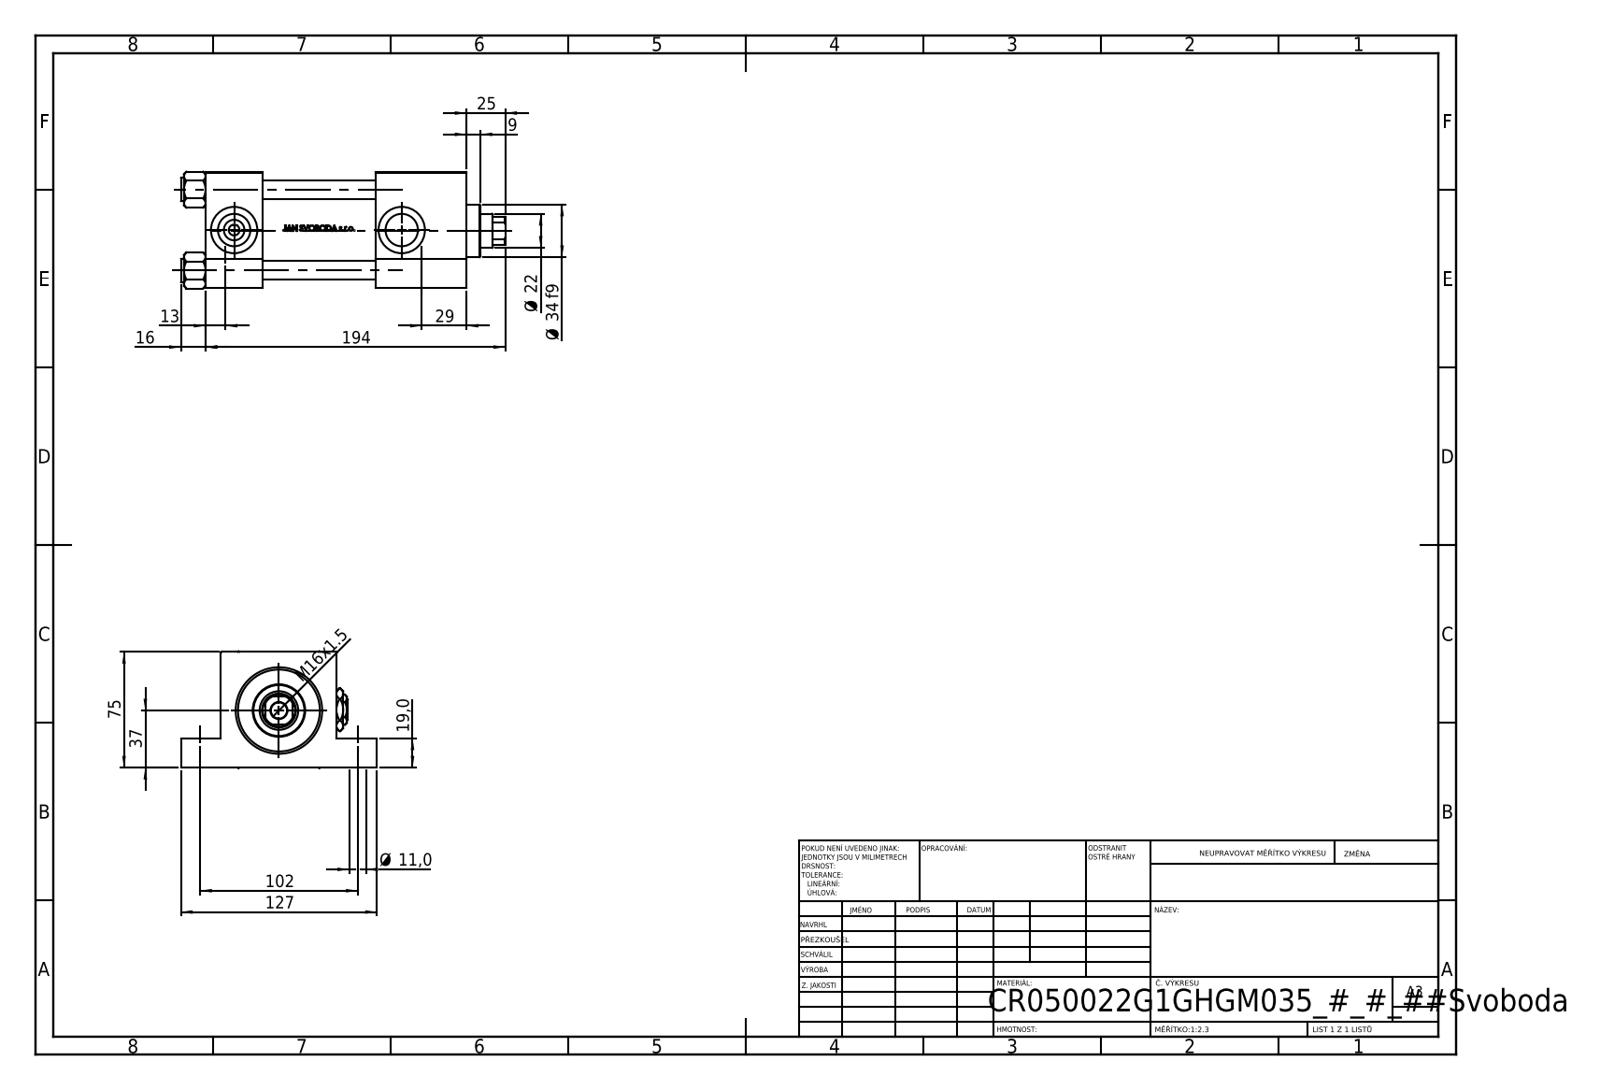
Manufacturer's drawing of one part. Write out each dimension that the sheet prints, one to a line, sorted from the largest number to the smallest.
194
127
102
75
37
Ø 34 f9
29
25
Ø 22
19,0
16
M16x1.5
13
Ø 11,0
9
